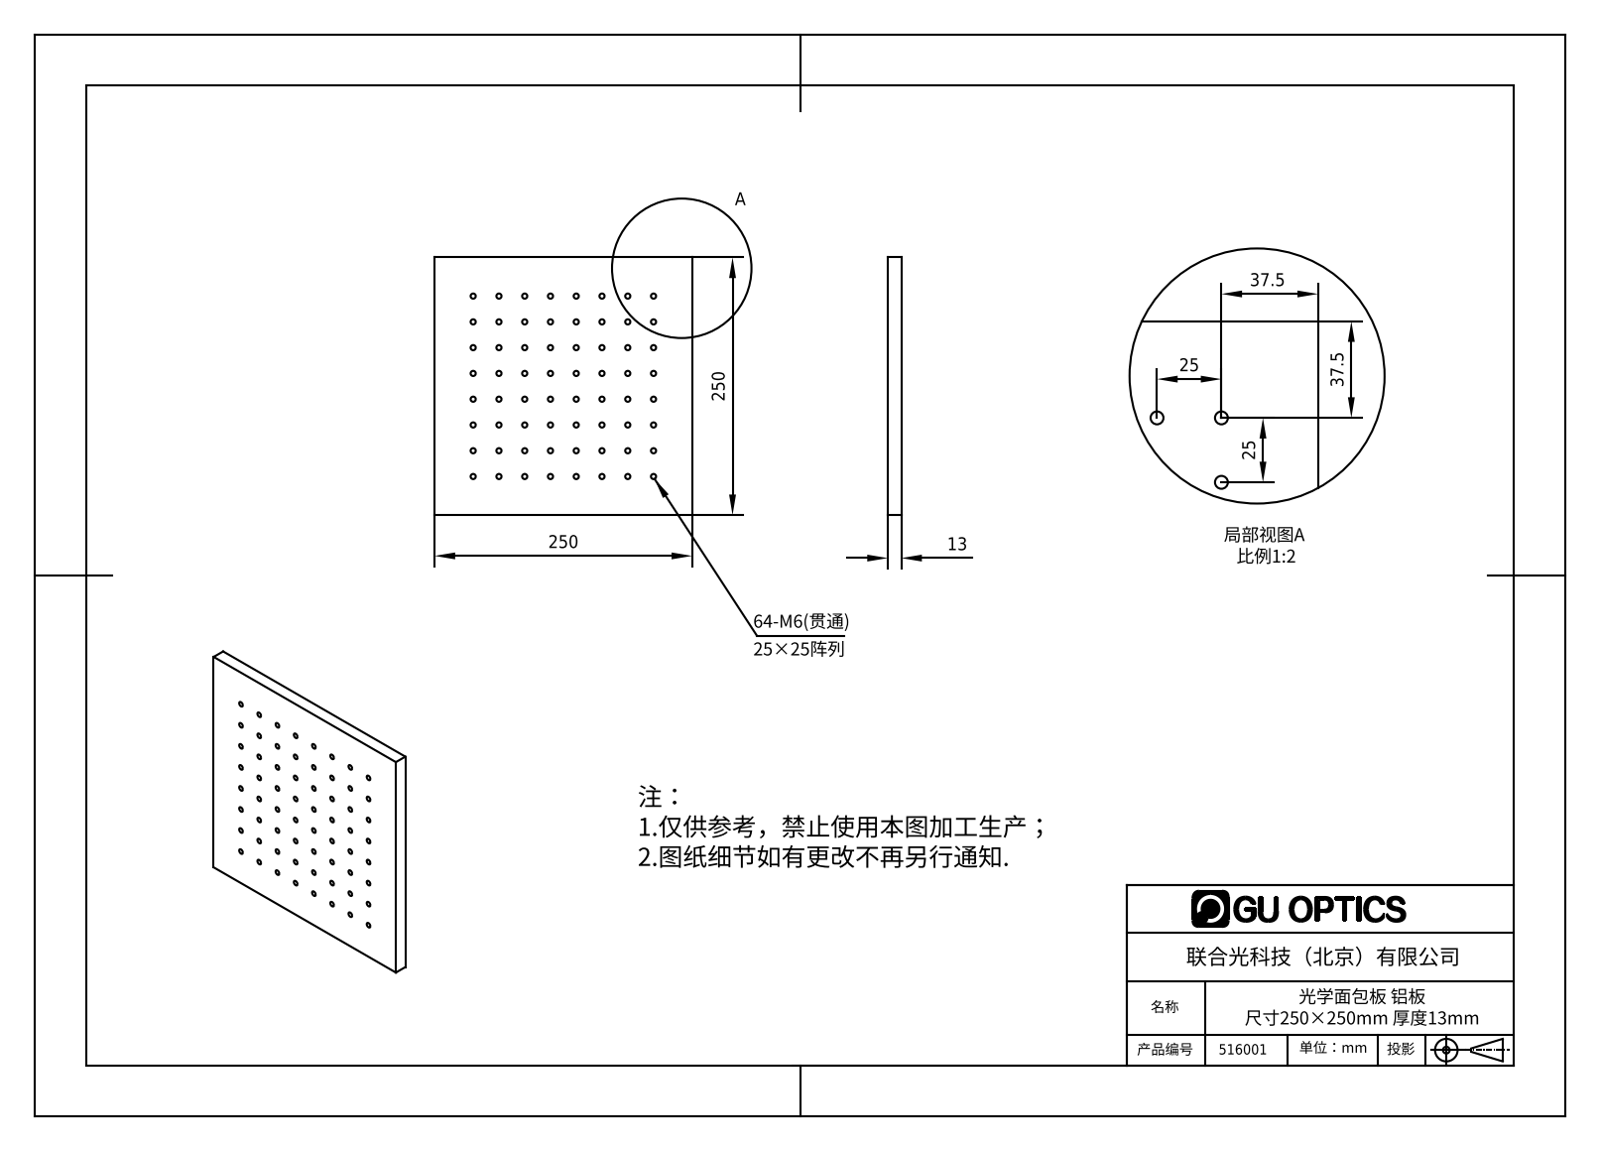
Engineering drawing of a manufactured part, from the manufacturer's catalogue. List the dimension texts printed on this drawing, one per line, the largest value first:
250
250
37.5
37.5
25
25
13
